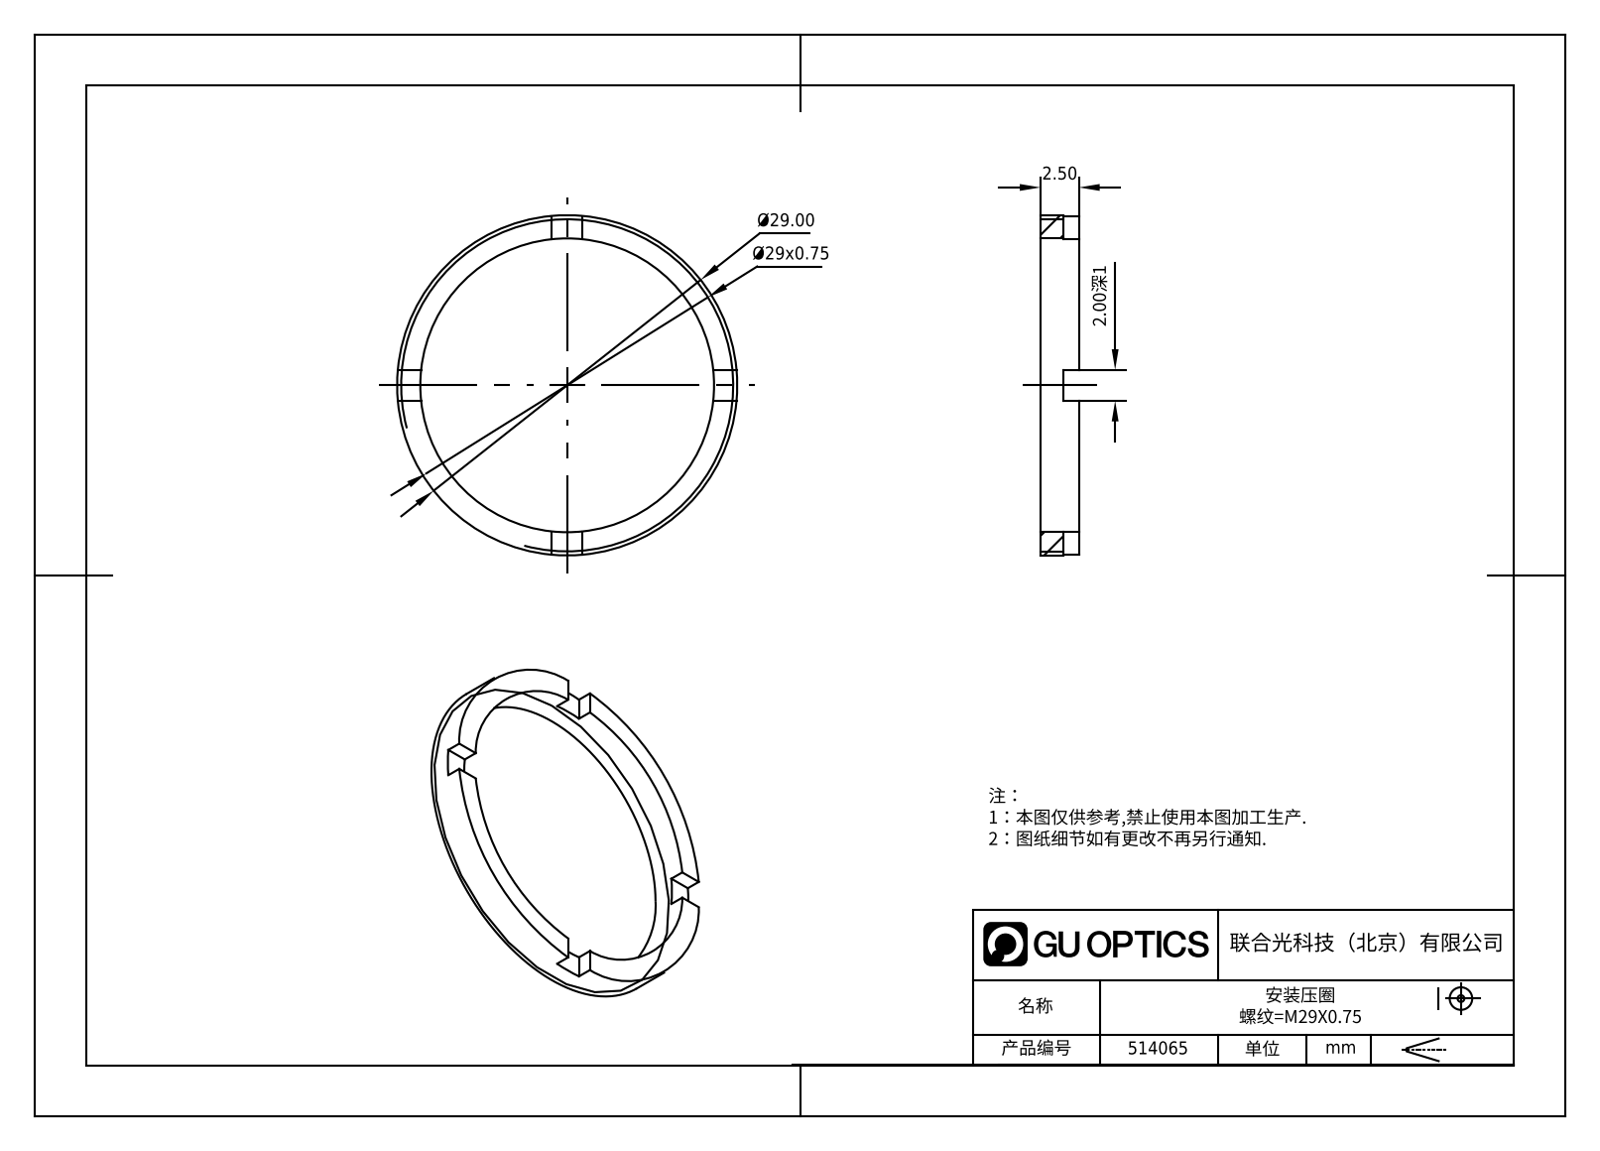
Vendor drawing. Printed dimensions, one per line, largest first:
Ø29.00
Ø29x0.75
2.50
2.00深1
